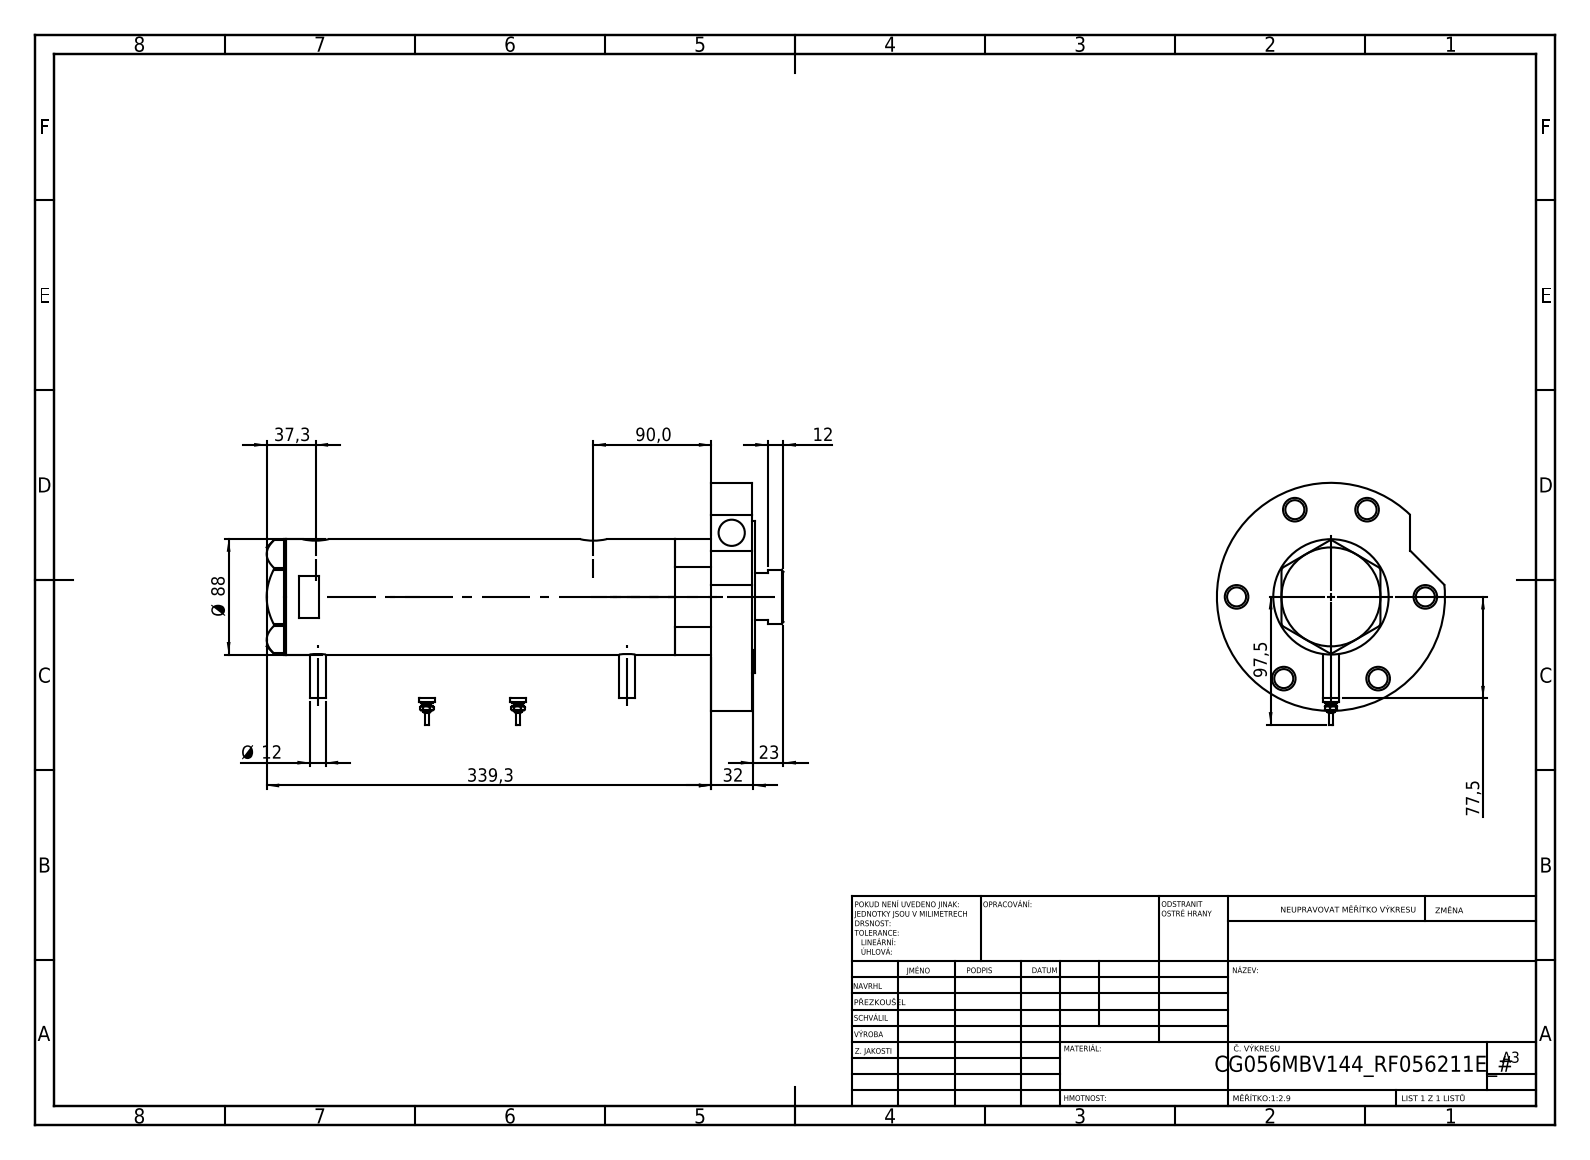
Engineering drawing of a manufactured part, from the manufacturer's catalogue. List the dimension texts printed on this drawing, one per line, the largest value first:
339,3
97,5
90,0
Ø 88
77,5
37,3
32
23
12
Ø 12
